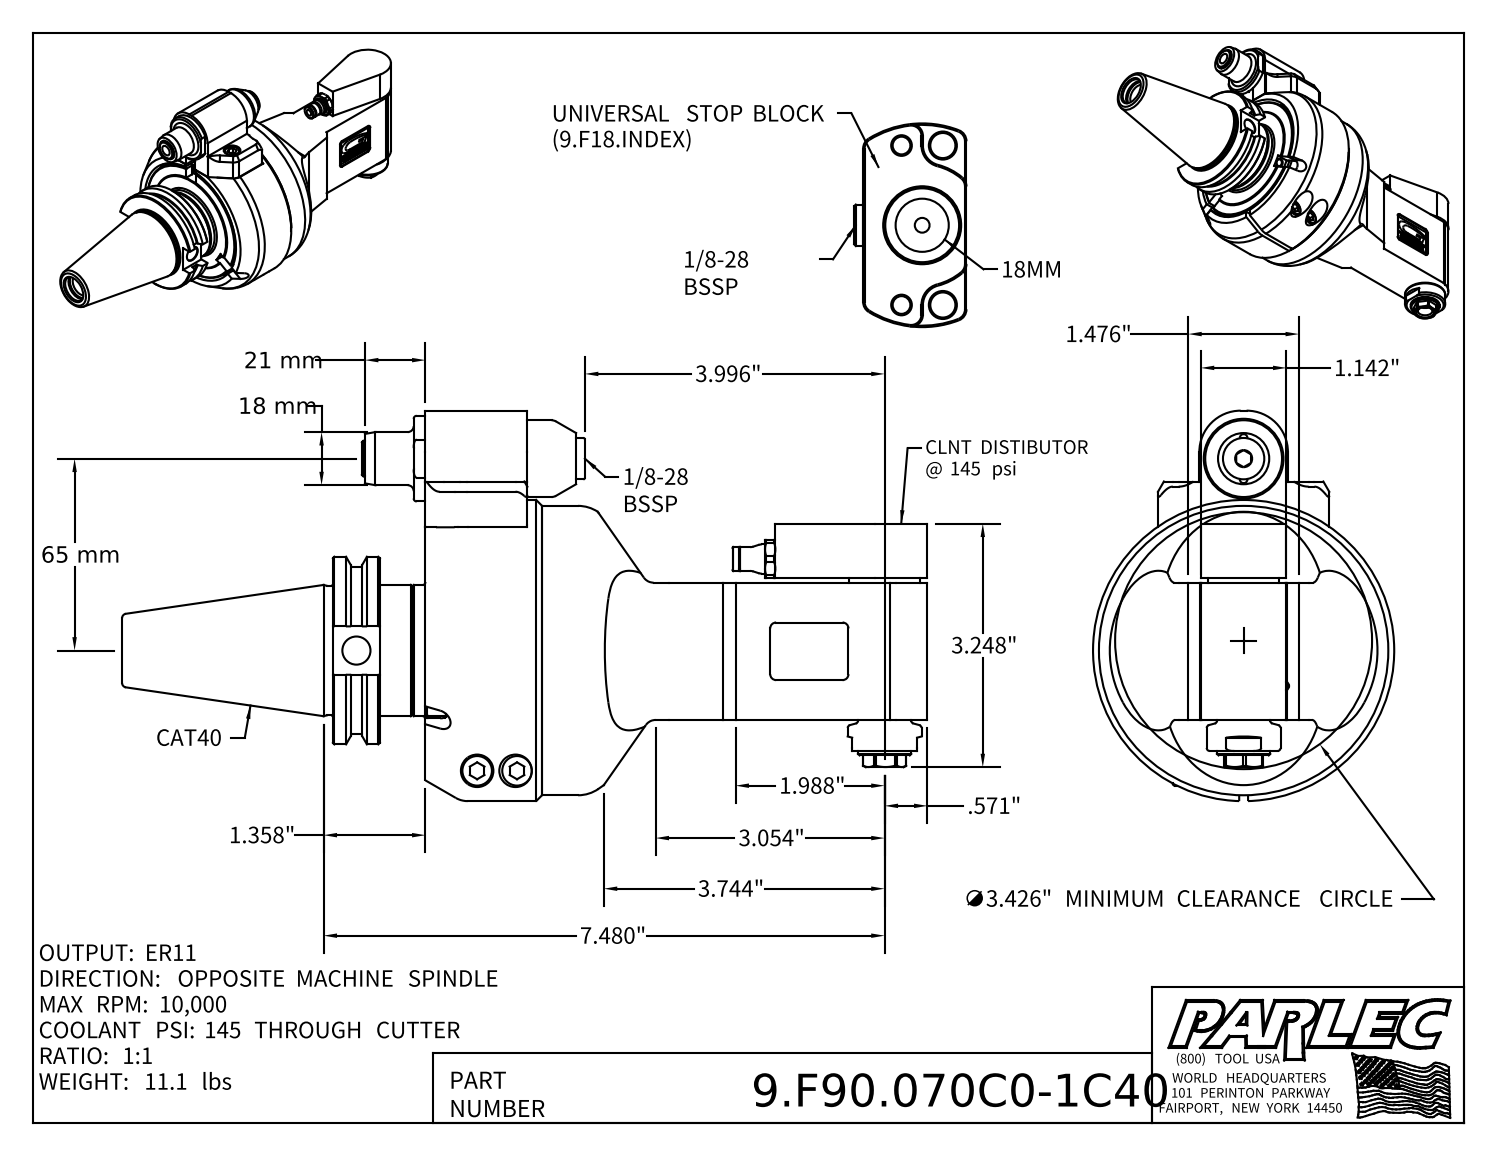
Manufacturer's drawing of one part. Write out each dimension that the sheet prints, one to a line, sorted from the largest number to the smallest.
65 mm
21 mm
18 mm
7.480"
3.996"
3.744"
∅3.426" MINIMUM CLEARANCE CIRCLE
3.248"
3.054"
1.988"
1.476"
1.358"
1.142"
.571"
